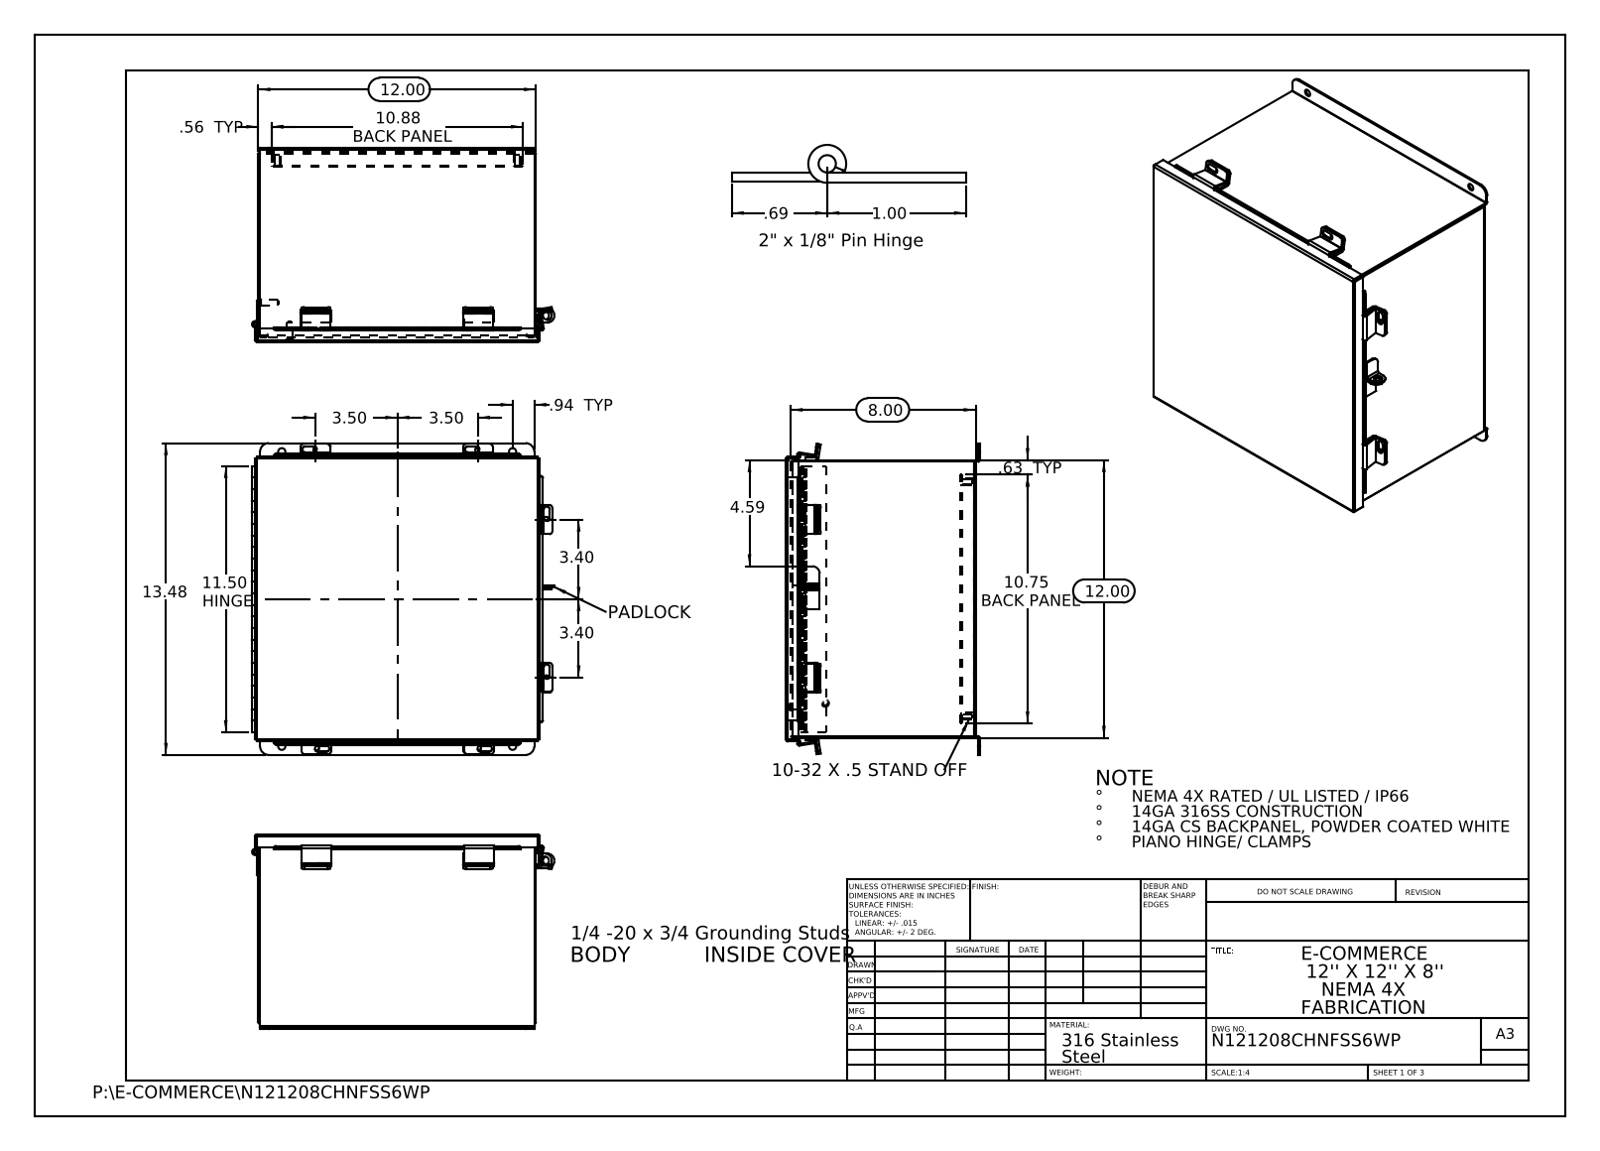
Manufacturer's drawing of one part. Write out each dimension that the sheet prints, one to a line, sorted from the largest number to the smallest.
13.48
12.00
12.00
11.50 HINGE
10.88 BACK PANEL
10.75 BACK PANEL
8.00
4.59
3.50
3.50
3.40
3.40
1.00
.94 TYP
.69
.63 TYP
.56 TYP
